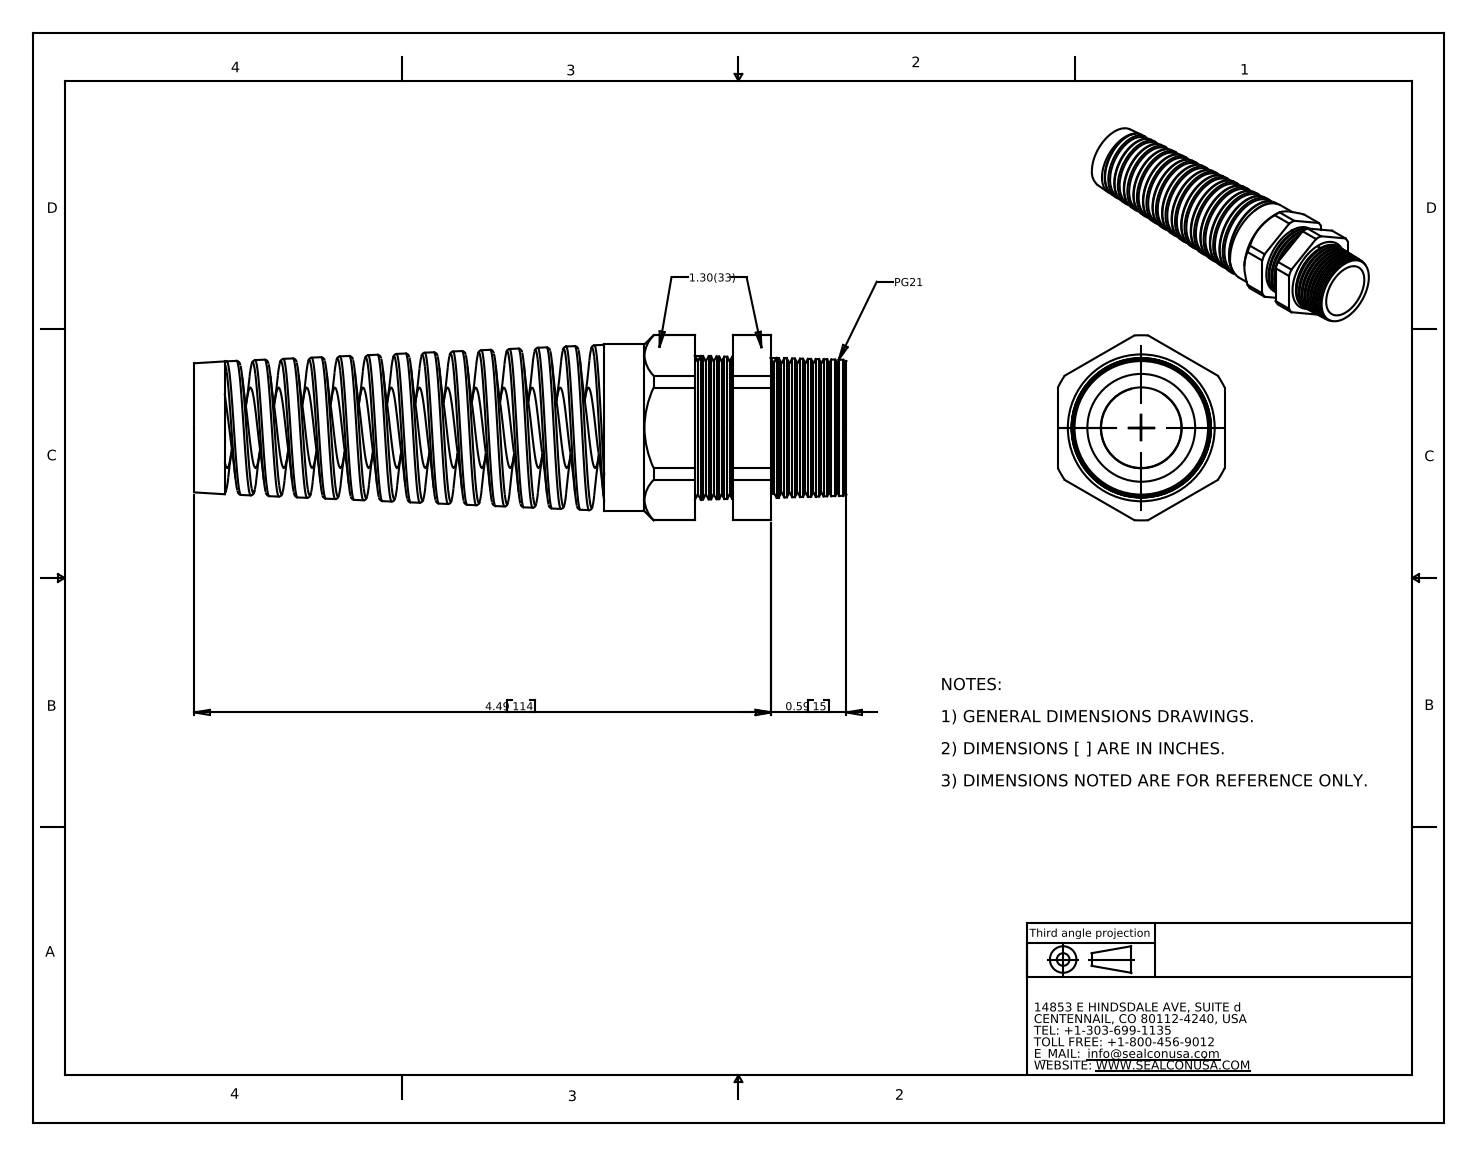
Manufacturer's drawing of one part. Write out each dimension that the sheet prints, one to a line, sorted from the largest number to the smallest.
4.49 114
0.59 15
